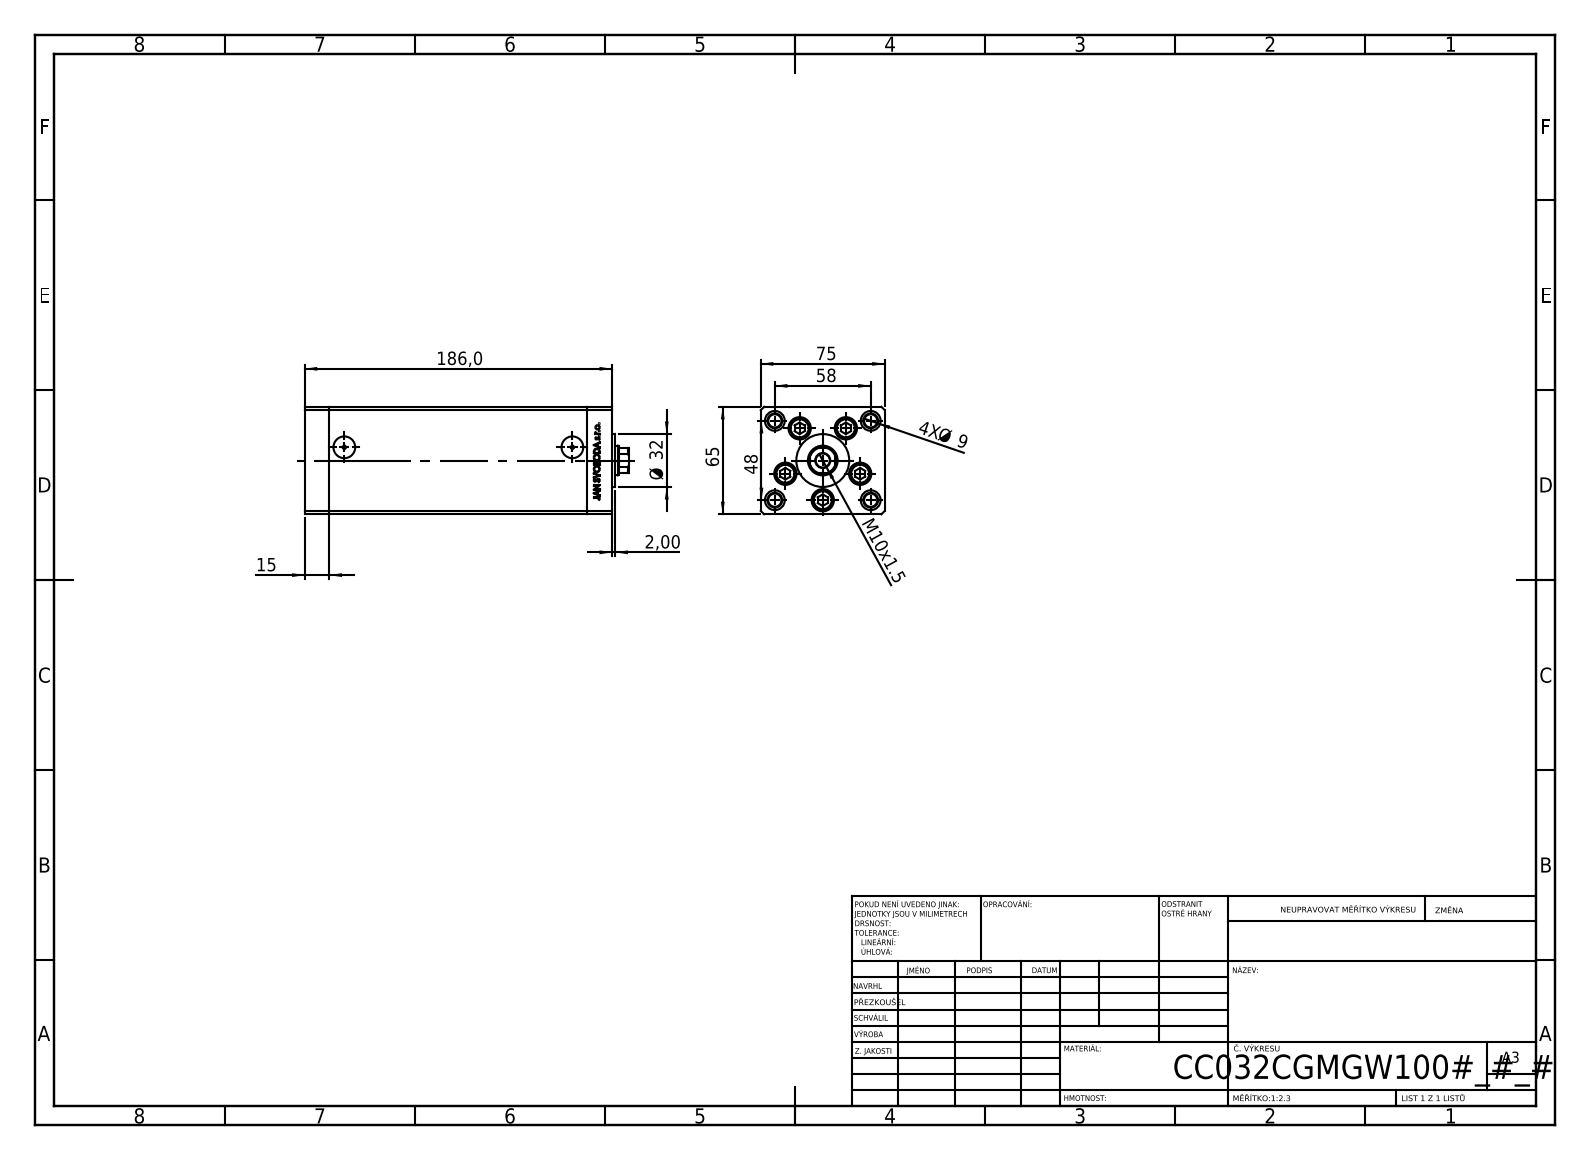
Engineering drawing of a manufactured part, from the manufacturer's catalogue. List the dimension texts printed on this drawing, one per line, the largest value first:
186,0
75
65
58
48
Ø 32
15
M10x1.5
4X Ø 9
2,00
